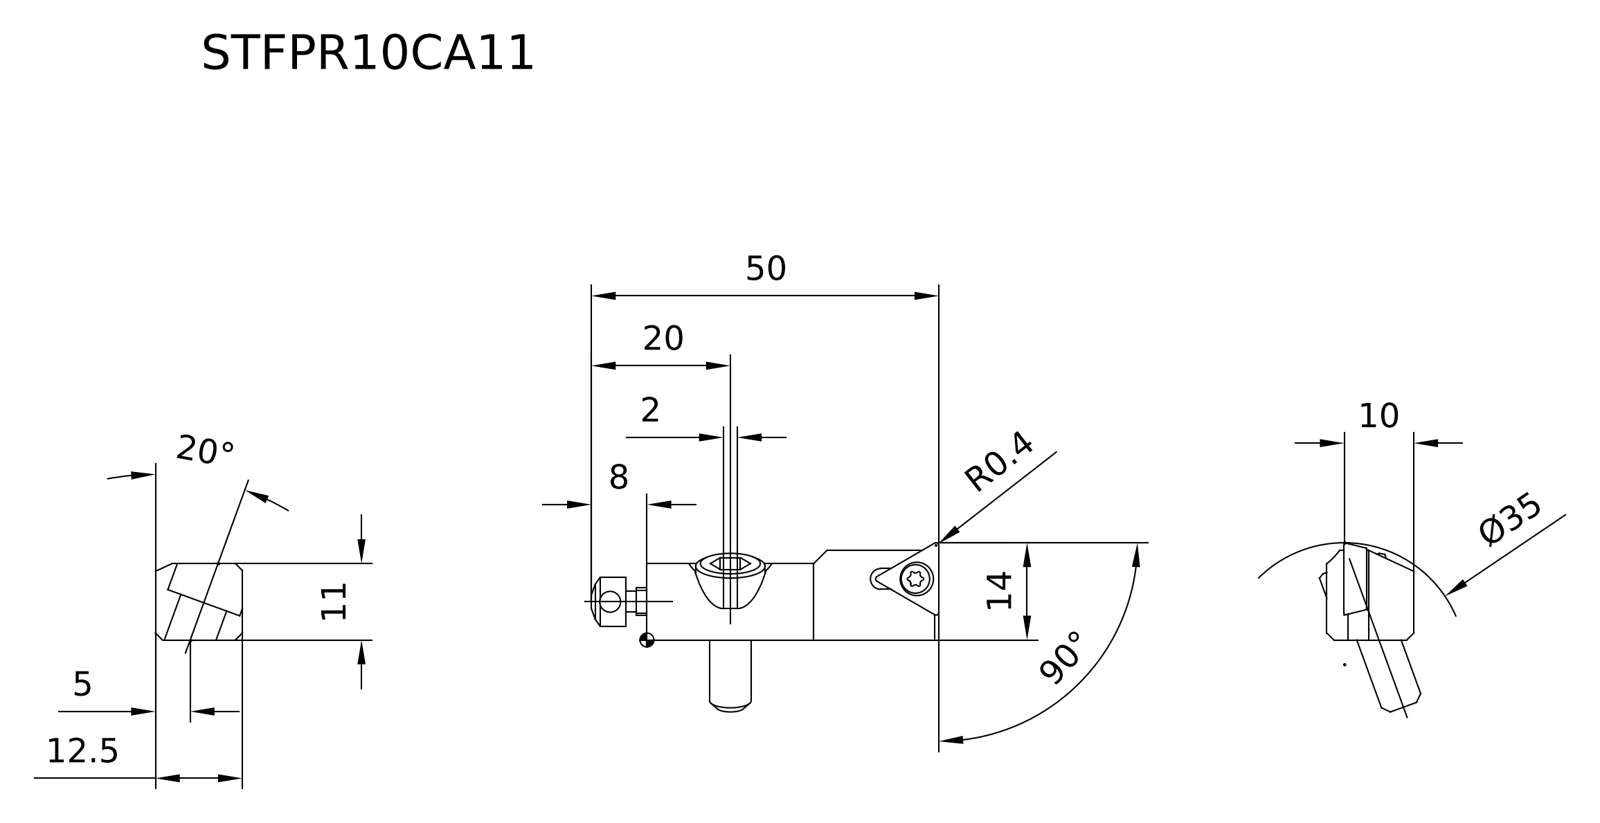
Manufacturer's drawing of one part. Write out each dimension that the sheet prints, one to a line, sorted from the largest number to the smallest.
90°
50
Ø35
20
20°
14
12.5
11
10
8
5
2
R0.4
